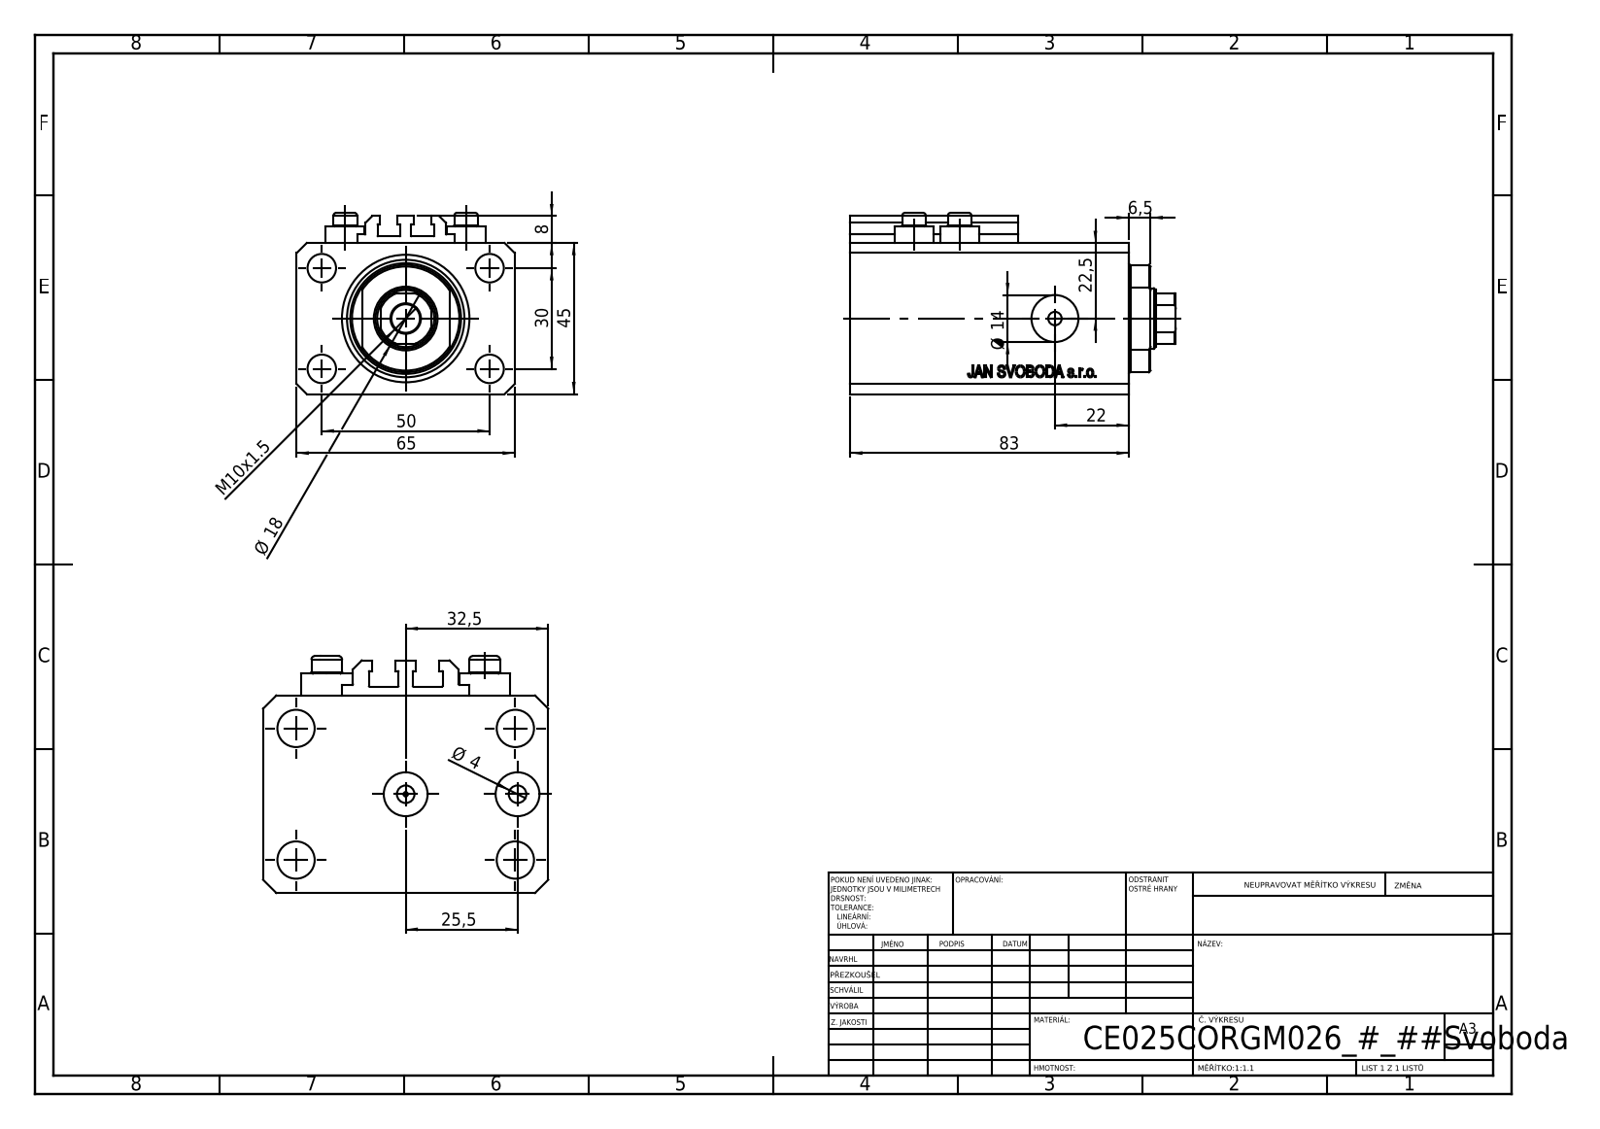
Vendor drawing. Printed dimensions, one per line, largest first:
83
65
50
45
32,5
30
25,5
22,5
22
Ø 18
Ø 14
M10x1.5
8
6,5
Ø 4
